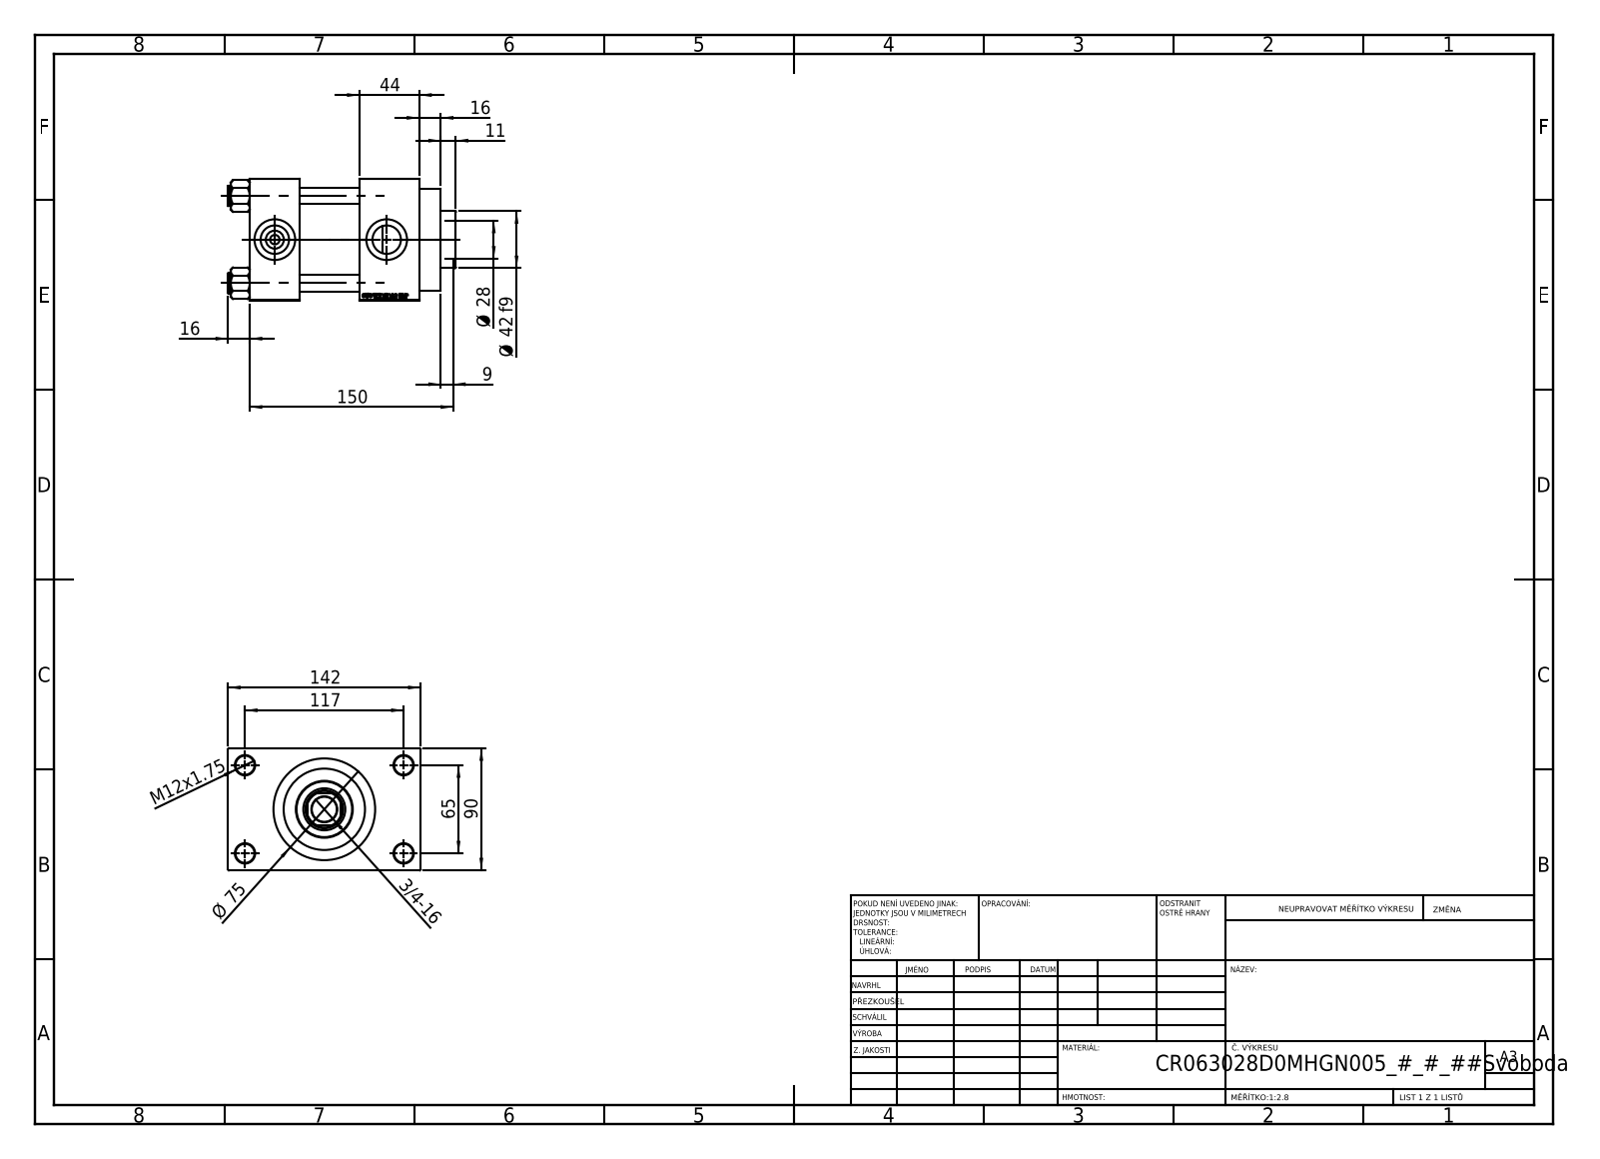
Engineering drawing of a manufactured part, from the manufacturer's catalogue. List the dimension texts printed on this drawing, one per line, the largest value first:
150
142
117
90
Ø 75
65
44
Ø 42 f9
Ø 28
16
16
M12x1.75
11
9
3/4-16
